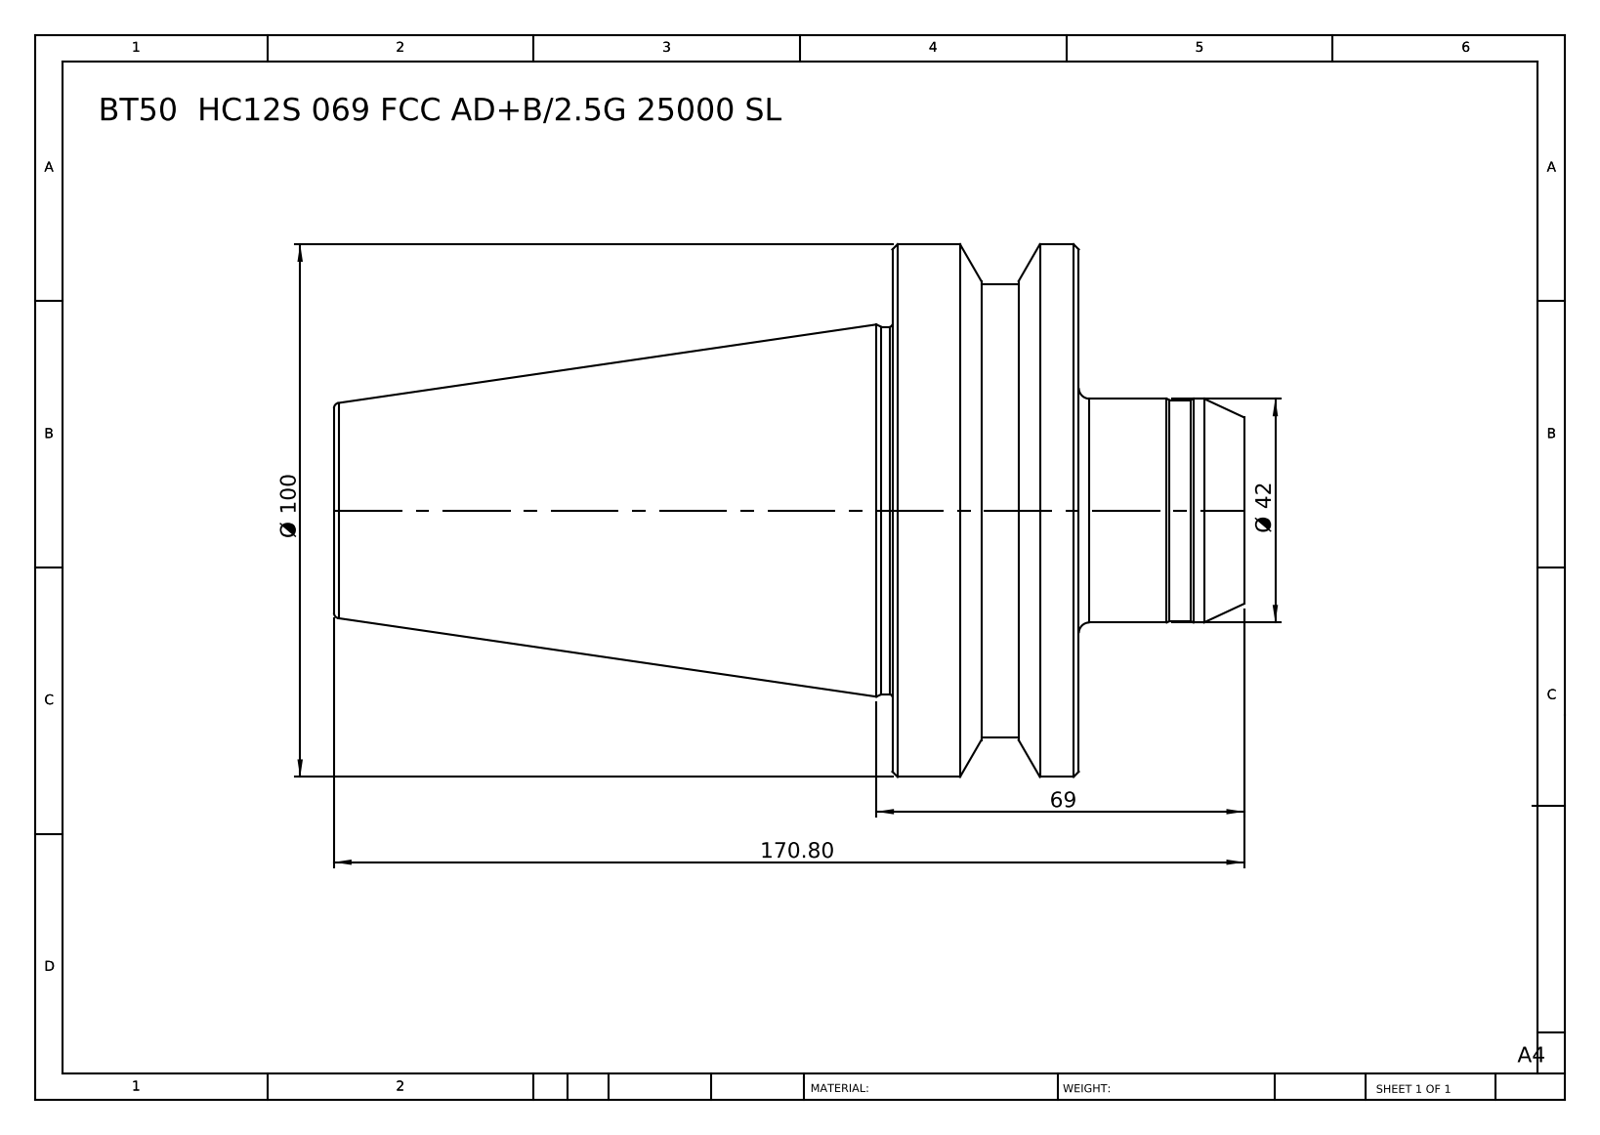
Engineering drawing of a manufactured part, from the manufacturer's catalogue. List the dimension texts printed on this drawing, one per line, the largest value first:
170.80
Ø 100
69
Ø 42
